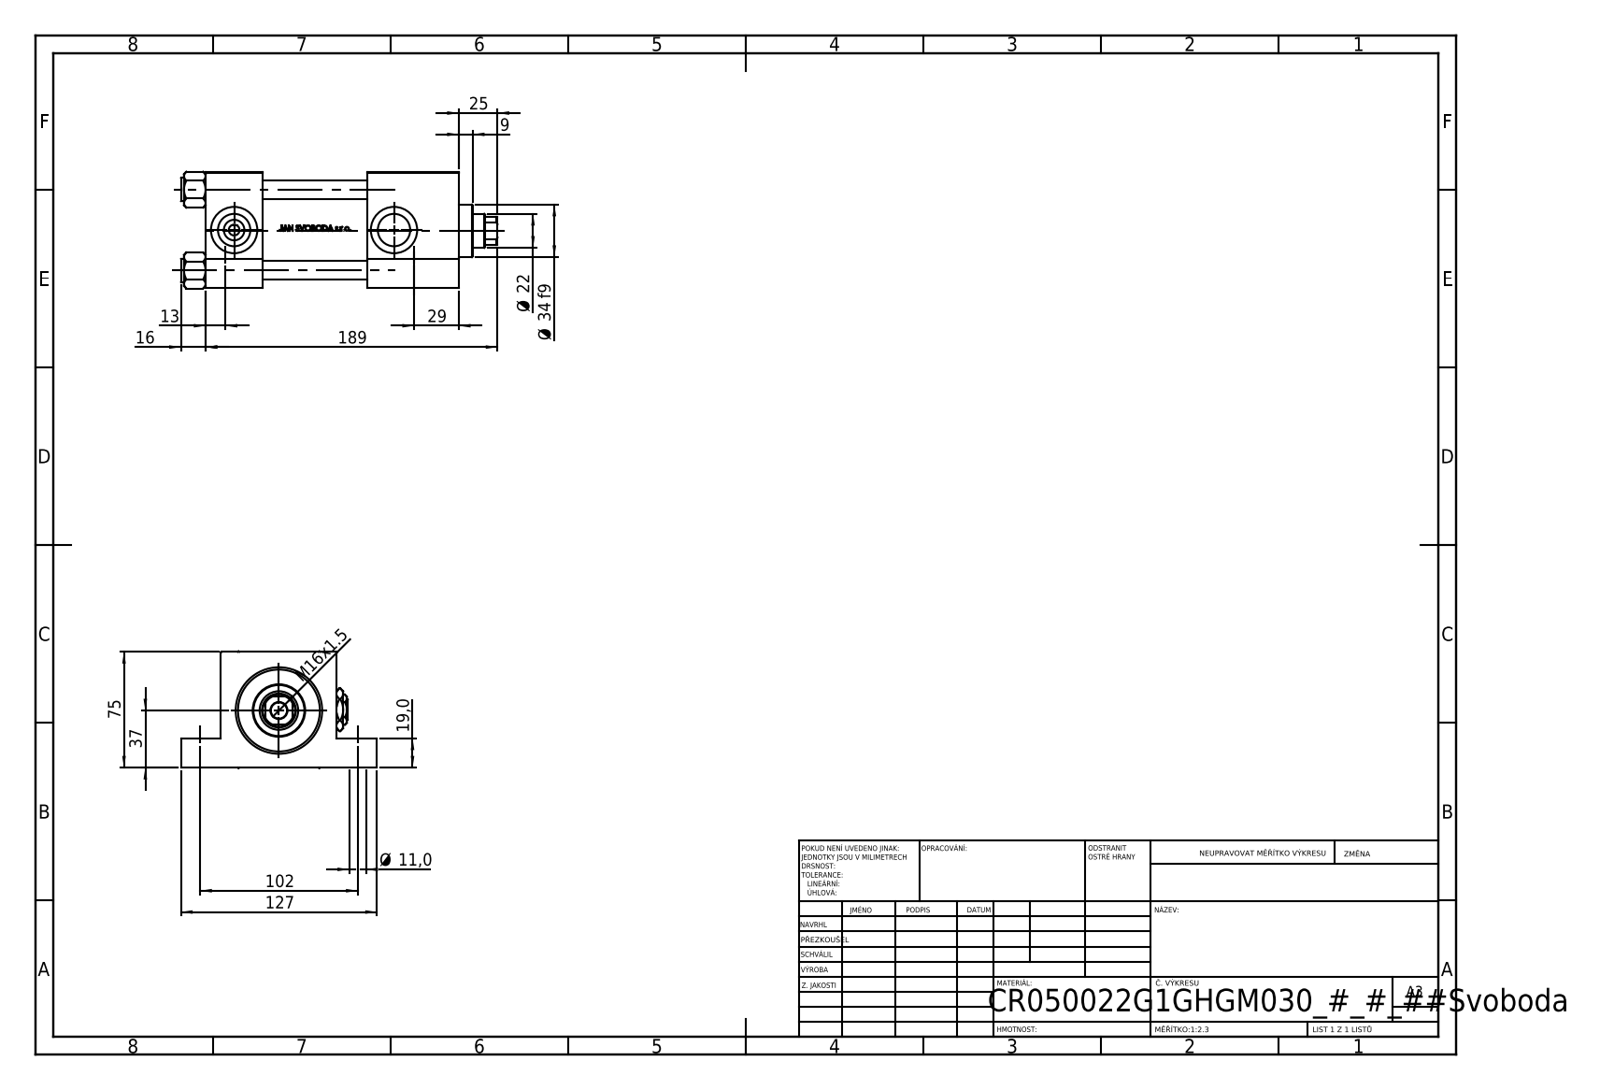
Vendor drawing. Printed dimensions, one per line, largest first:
189
127
102
75
37
Ø 34 f9
29
25
Ø 22
19,0
16
M16x1.5
13
Ø 11,0
9
